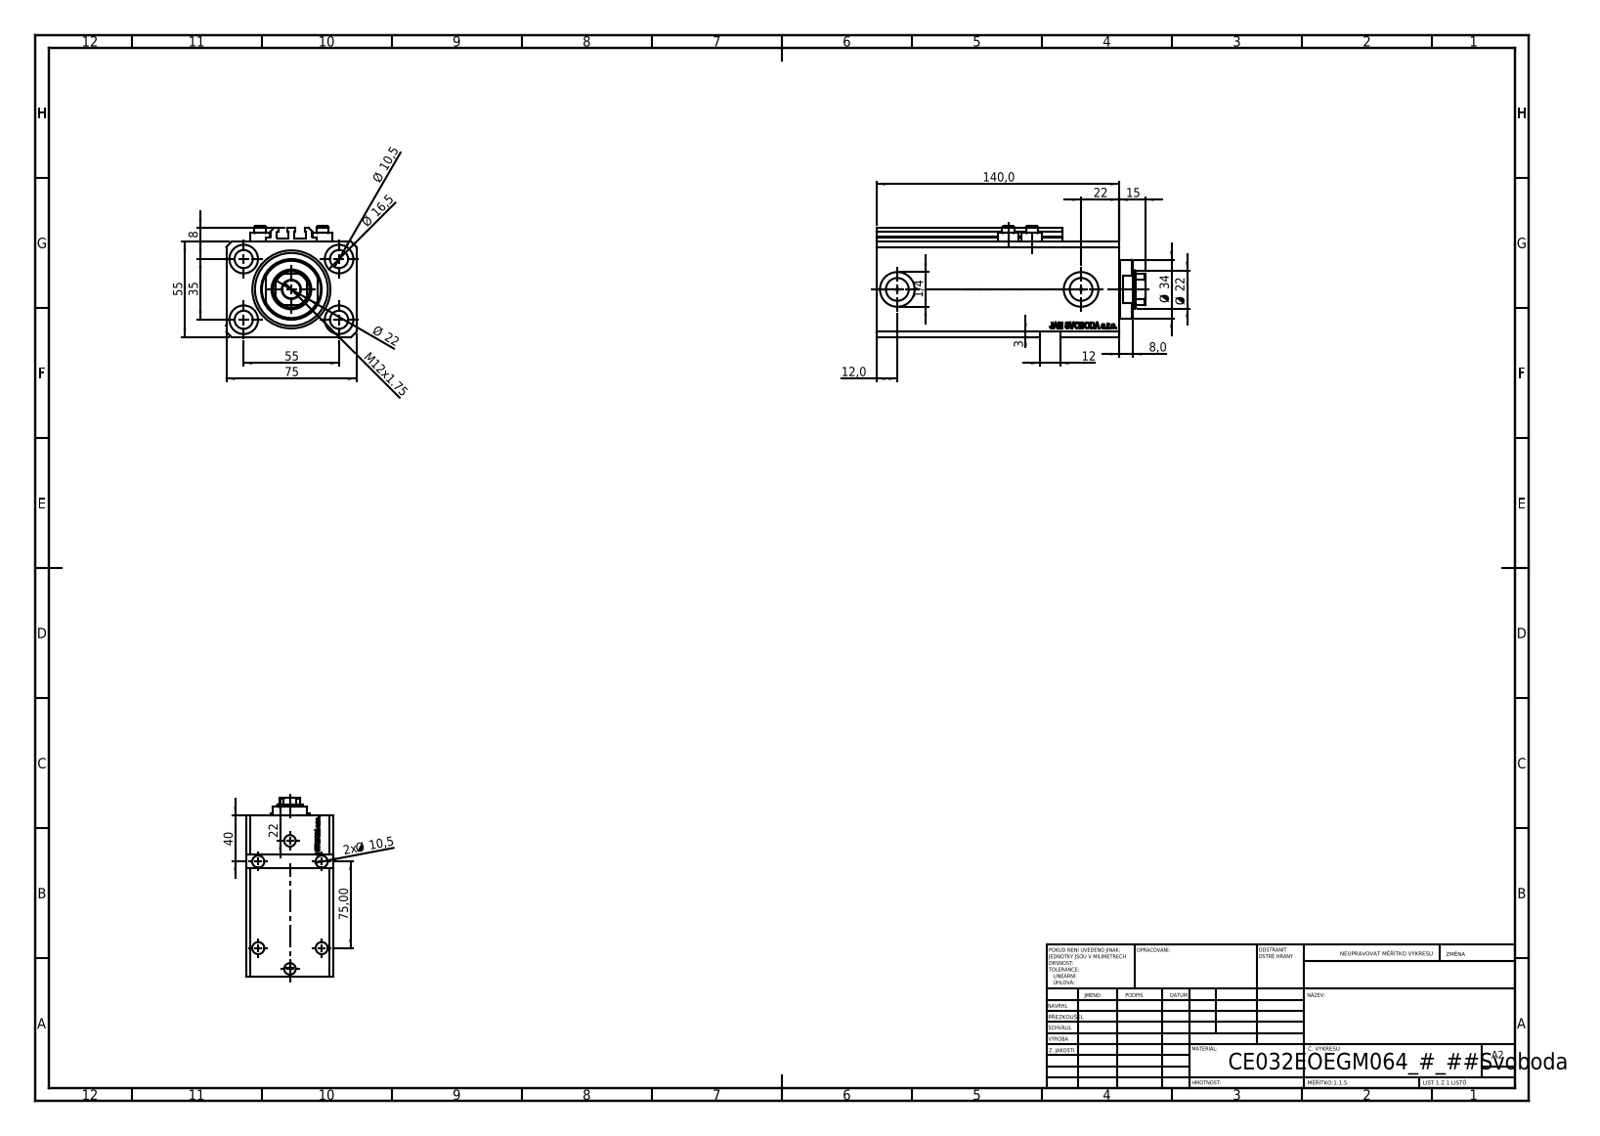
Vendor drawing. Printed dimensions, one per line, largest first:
140,0
75
75,00
55
55
40
35
Ø 34
Ø 22
22
Ø 22
22
Ø 16,5
15
M12x1.75
12,0
12
Ø 10,5
2x Ø 10,5
8
8,0
3
1/4
